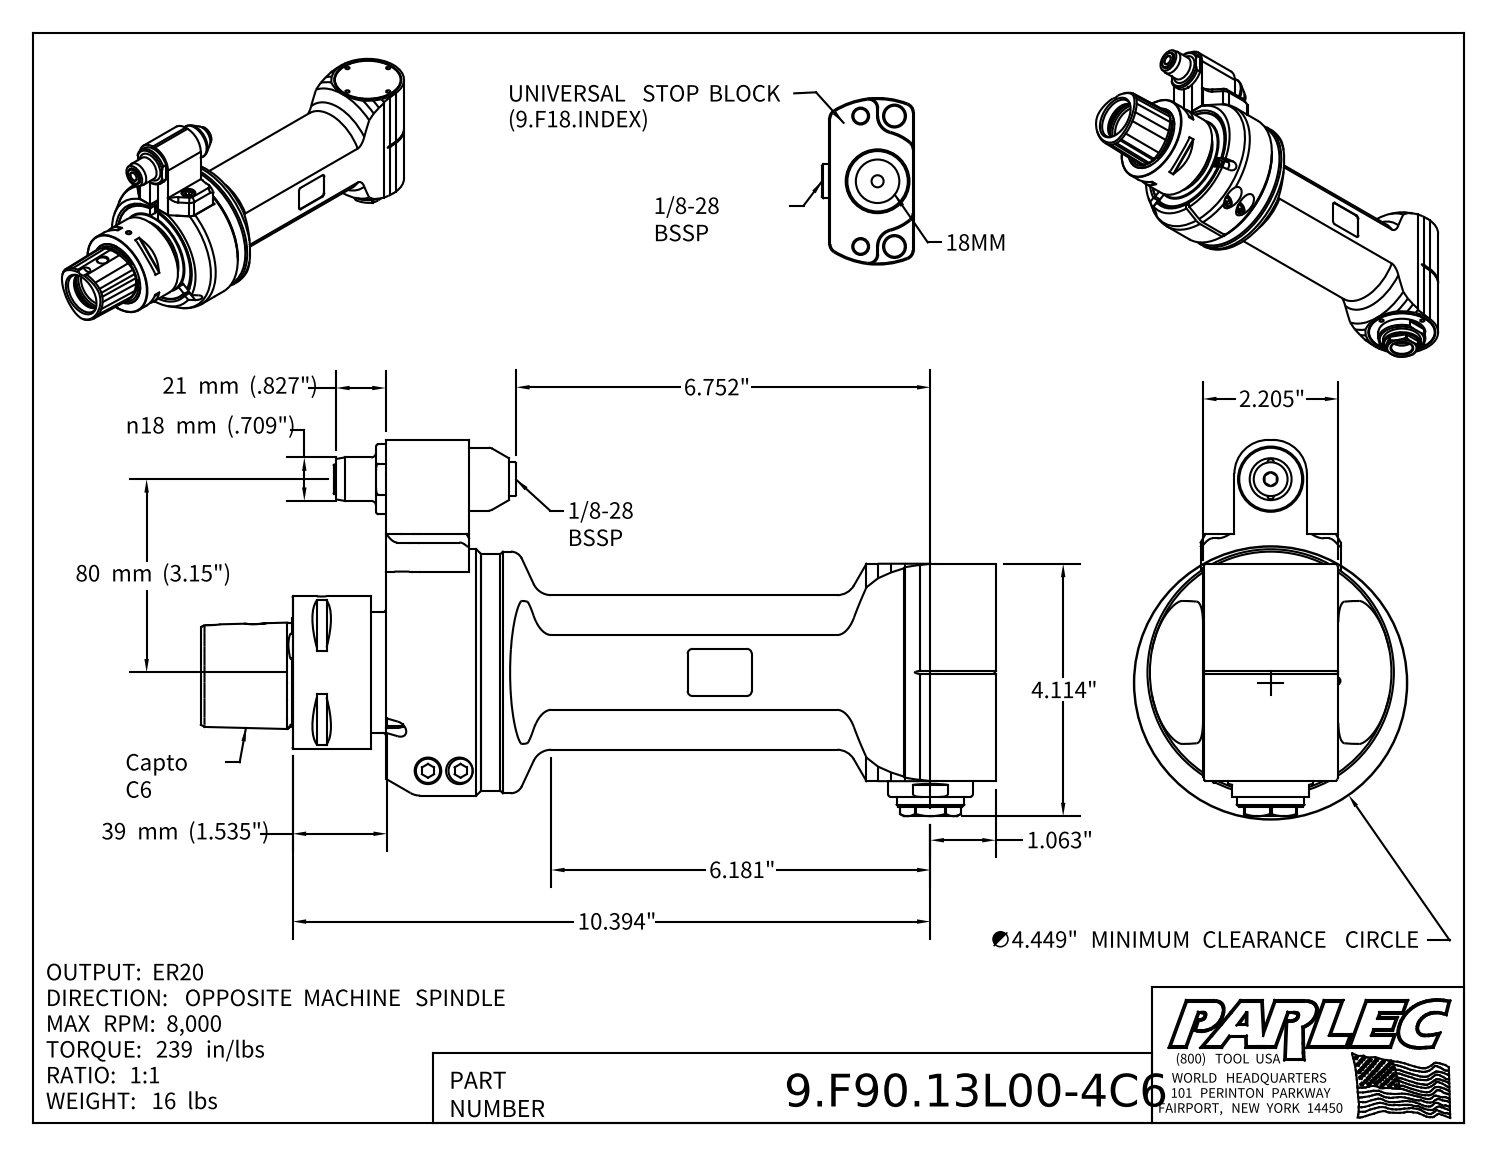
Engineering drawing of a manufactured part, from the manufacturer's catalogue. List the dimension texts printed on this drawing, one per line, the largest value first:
80 mm (3.15")
39 mm (1.535")
21 mm (.827")
n18 mm (.709")
10.394"
6.752"
6.181"
∅4.449" MINIMUM CLEARANCE CIRCLE
4.114"
2.205"
1.063"
